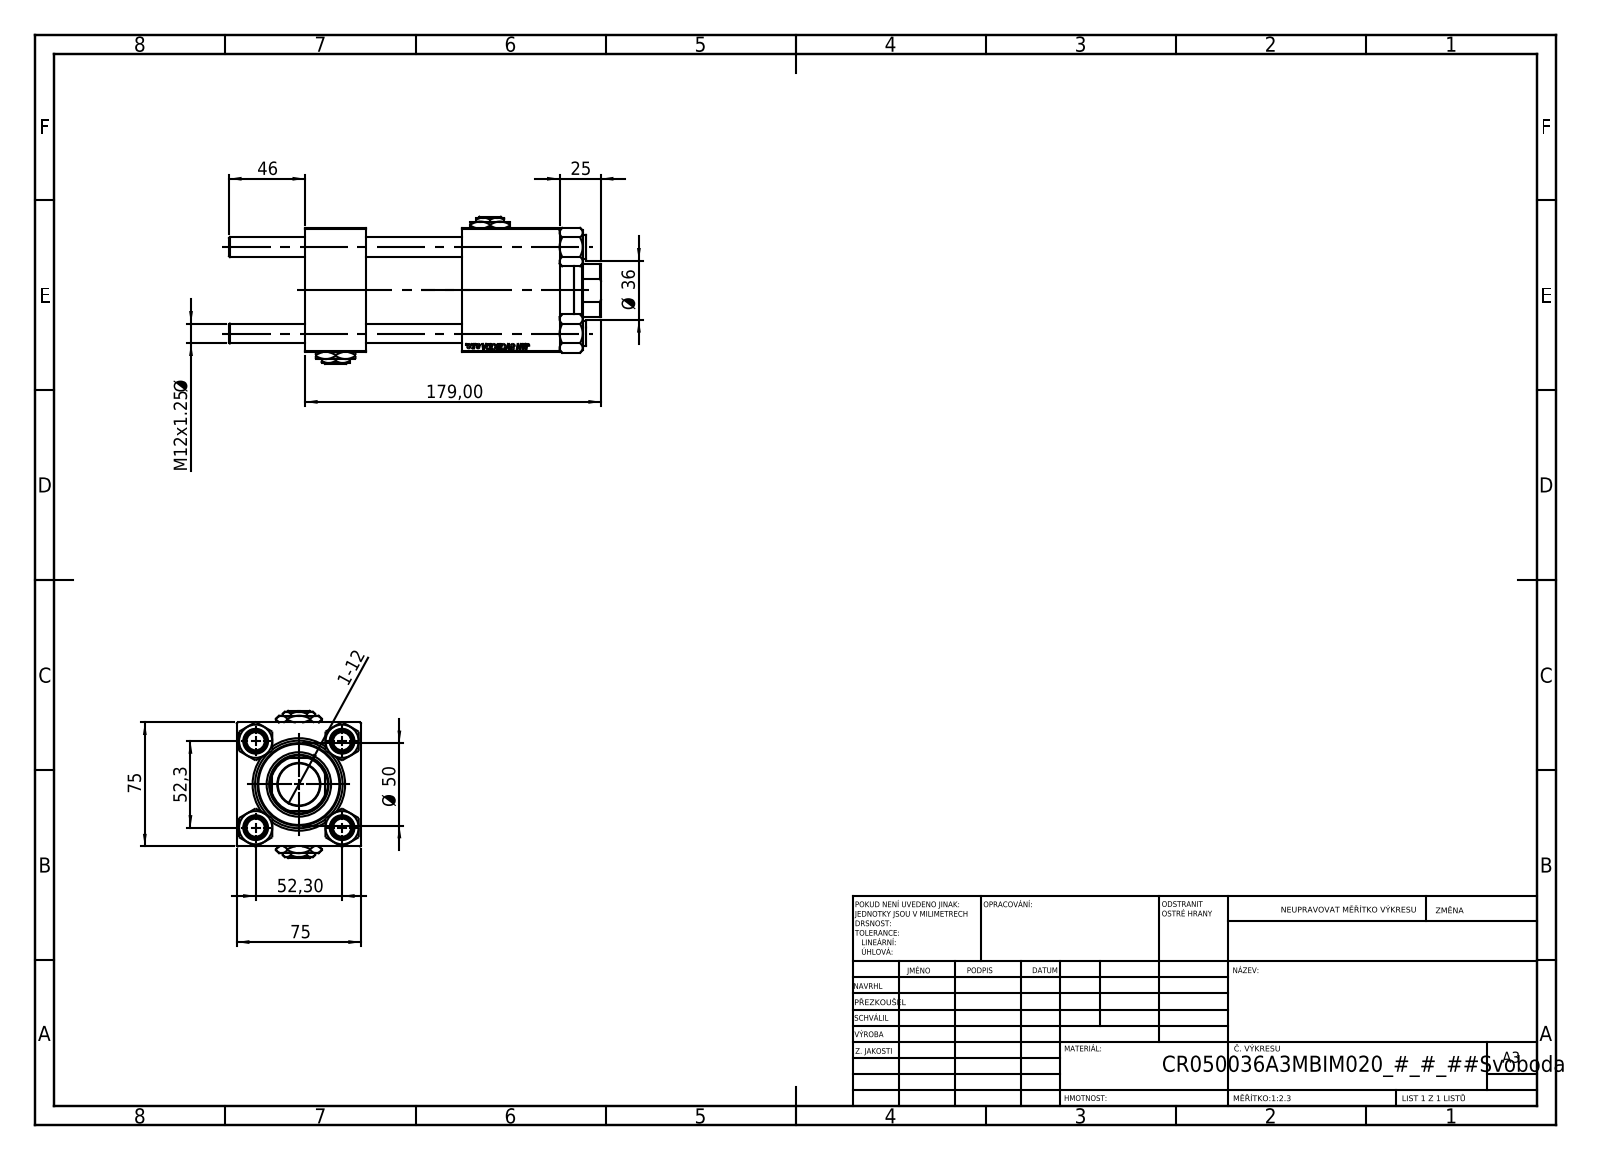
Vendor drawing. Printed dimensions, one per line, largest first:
179,00
75
75
52,3
52,30
Ø 50
46
Ø 36
25
M12x1.25 Ø
1-12
